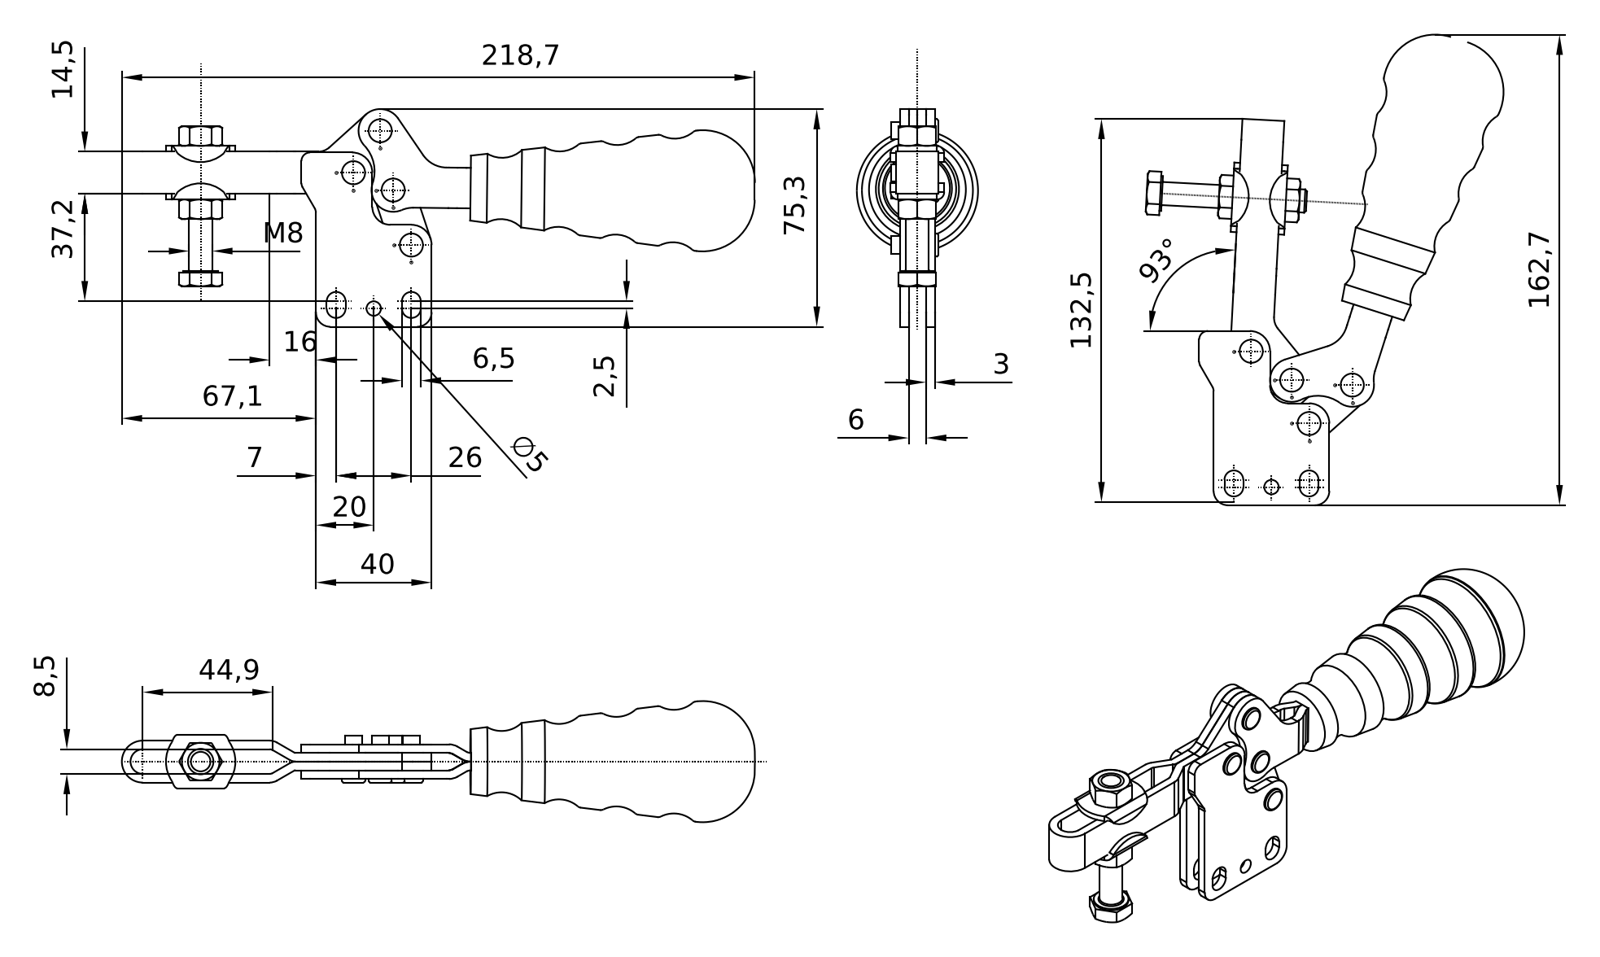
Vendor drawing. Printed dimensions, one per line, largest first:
218,7
162,7
132,5
93°
75,3
67,1
44,9
40
37,2
26
20
16
14,5
8,5
M8
7
6,5
6
∅5
3
2,5
